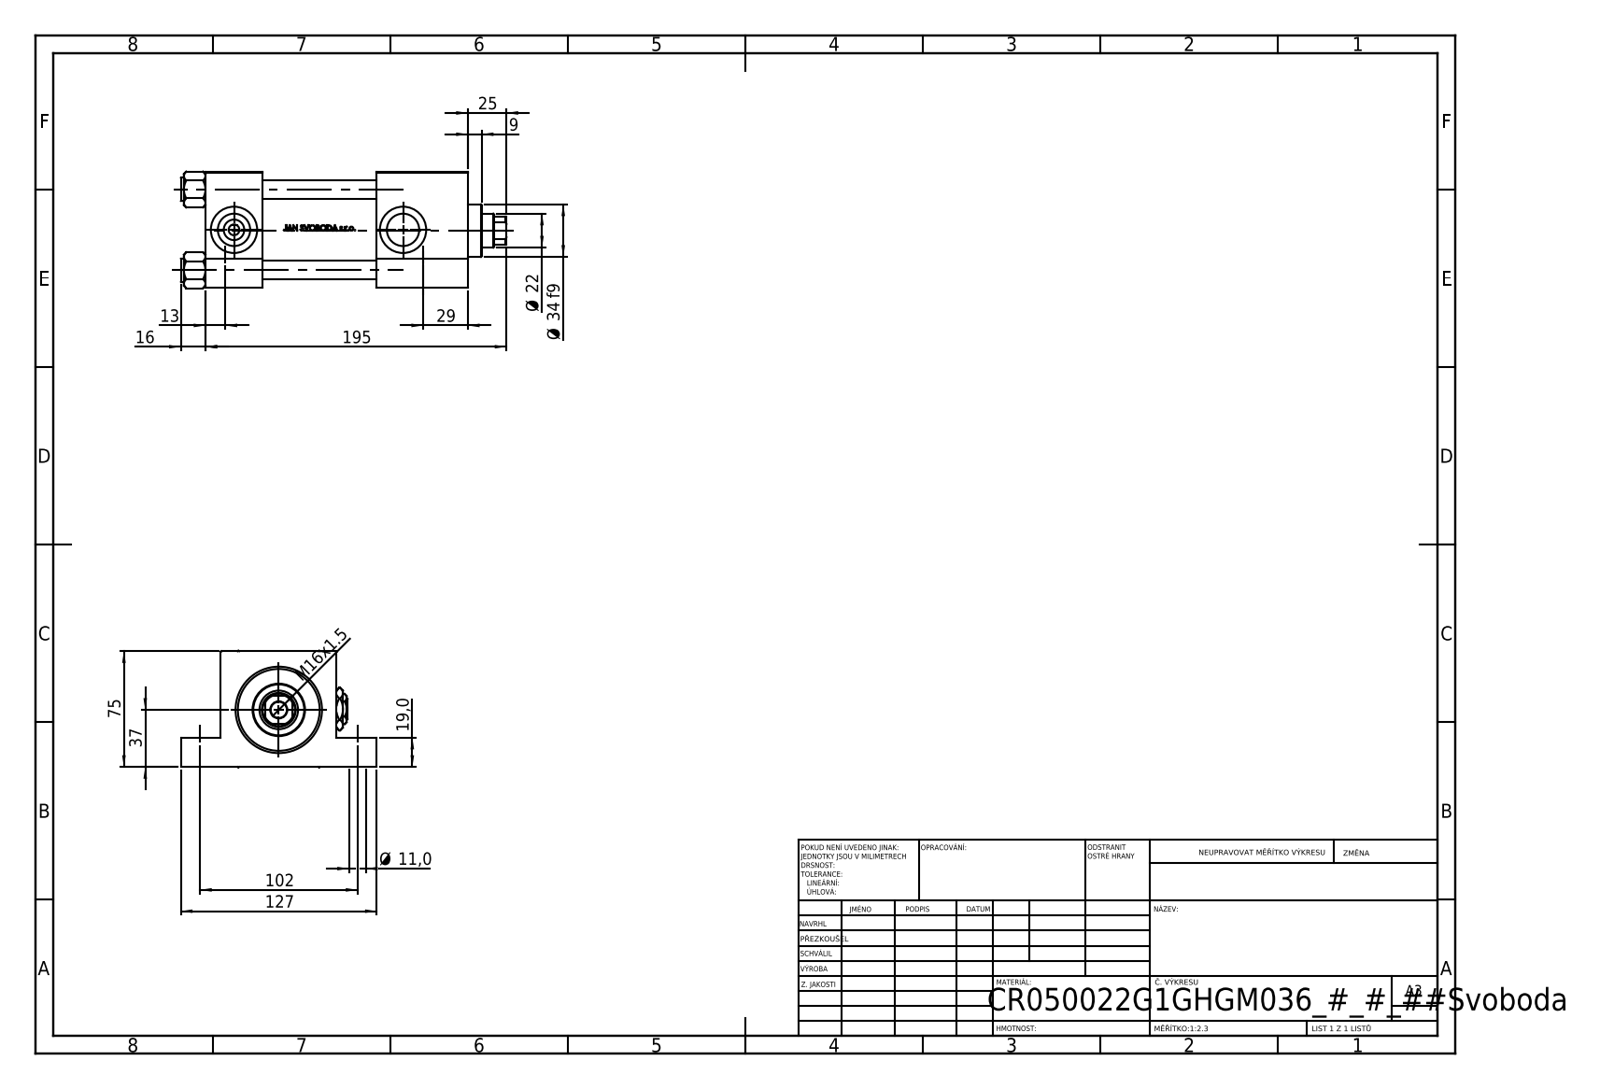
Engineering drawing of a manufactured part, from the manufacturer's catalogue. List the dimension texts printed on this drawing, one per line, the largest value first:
195
127
102
75
37
Ø 34 f9
29
25
Ø 22
19,0
16
M16x1.5
13
Ø 11,0
9
